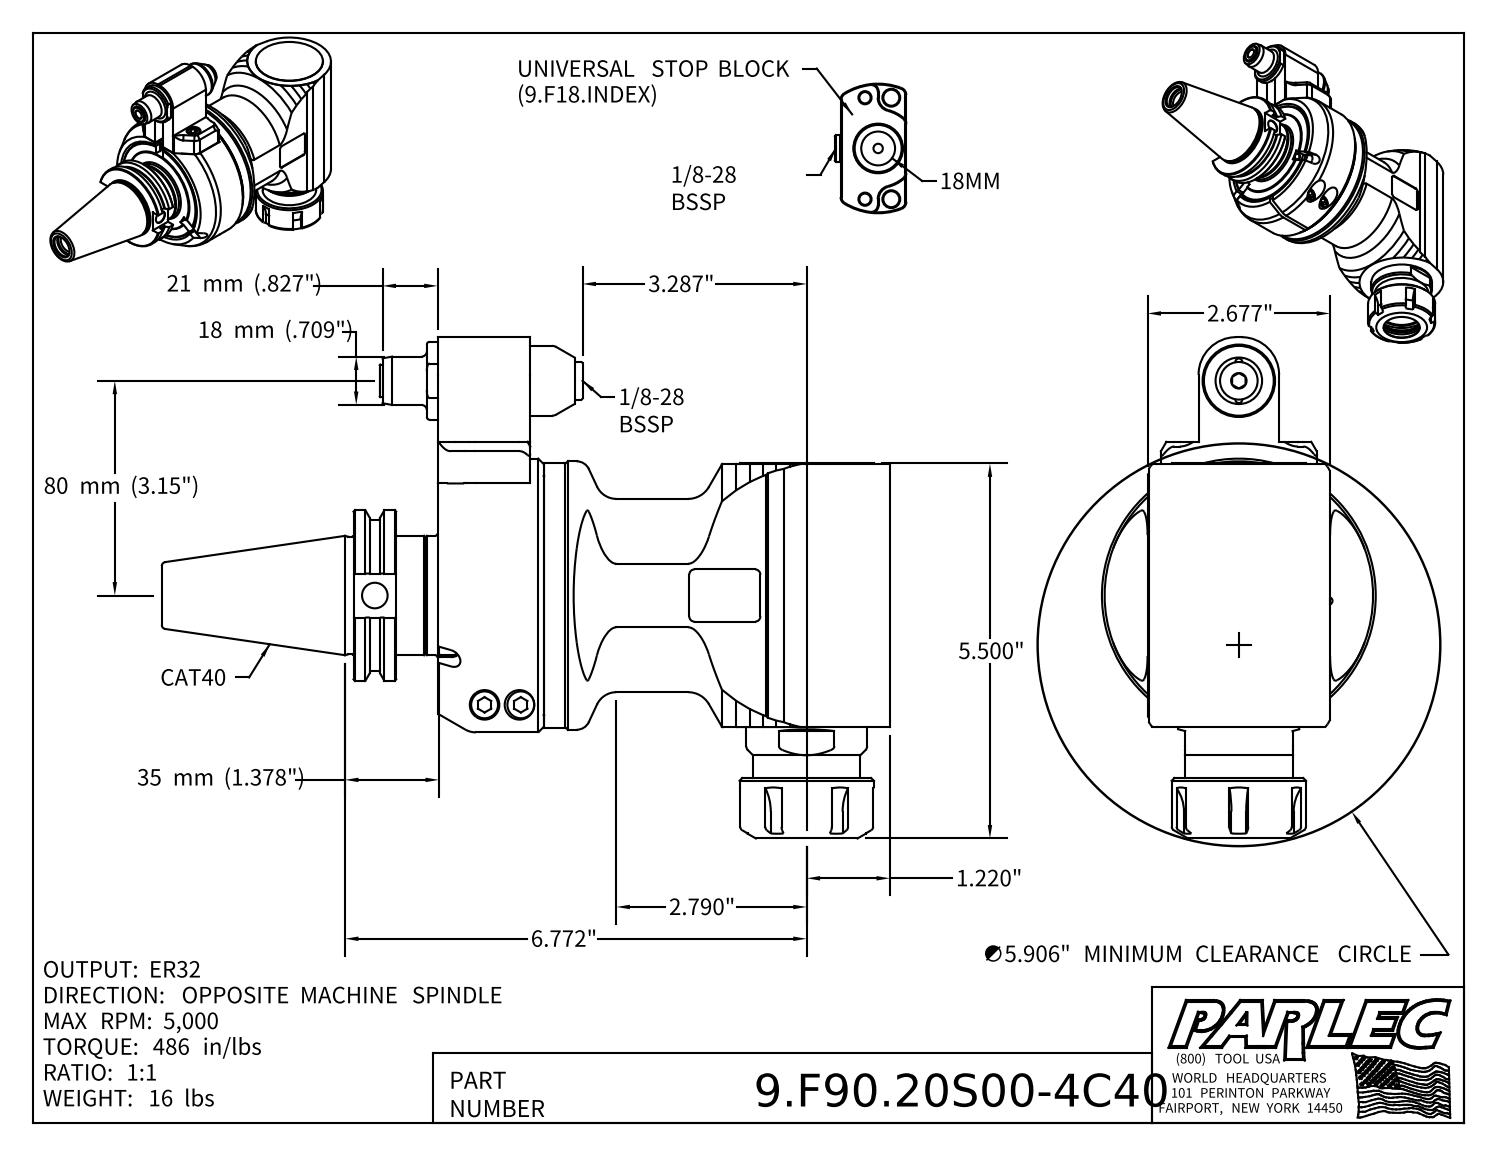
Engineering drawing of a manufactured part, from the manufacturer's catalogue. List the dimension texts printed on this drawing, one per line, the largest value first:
80 mm (3.15")
35 mm (1.378")
21 mm (.827")
18 mm (.709")
6.772"
∅5.906" MINIMUM CLEARANCE CIRCLE
5.500"
3.287"
2.790"
2.677"
1.220"
